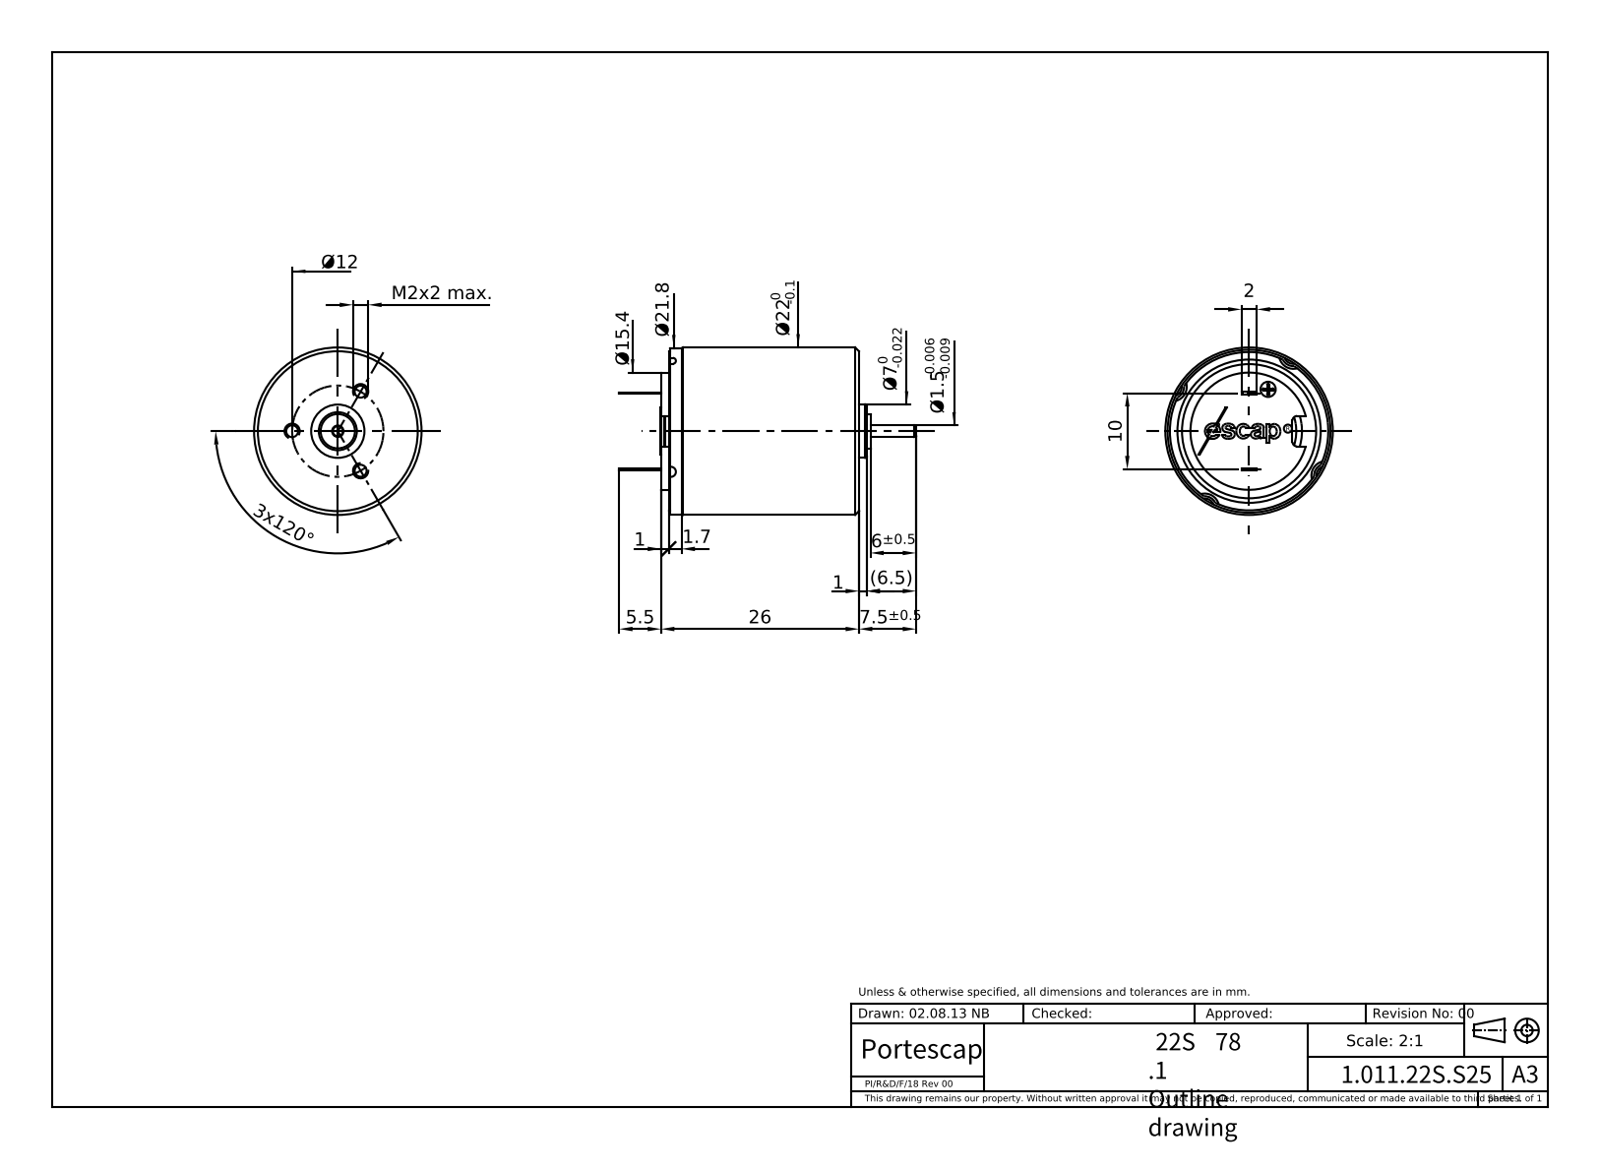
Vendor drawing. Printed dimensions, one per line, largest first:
3x120°
26
10
7.5±0.5
(6.5)
6±0.5
5.5
M2x2 max.
2
1.7
1
1
